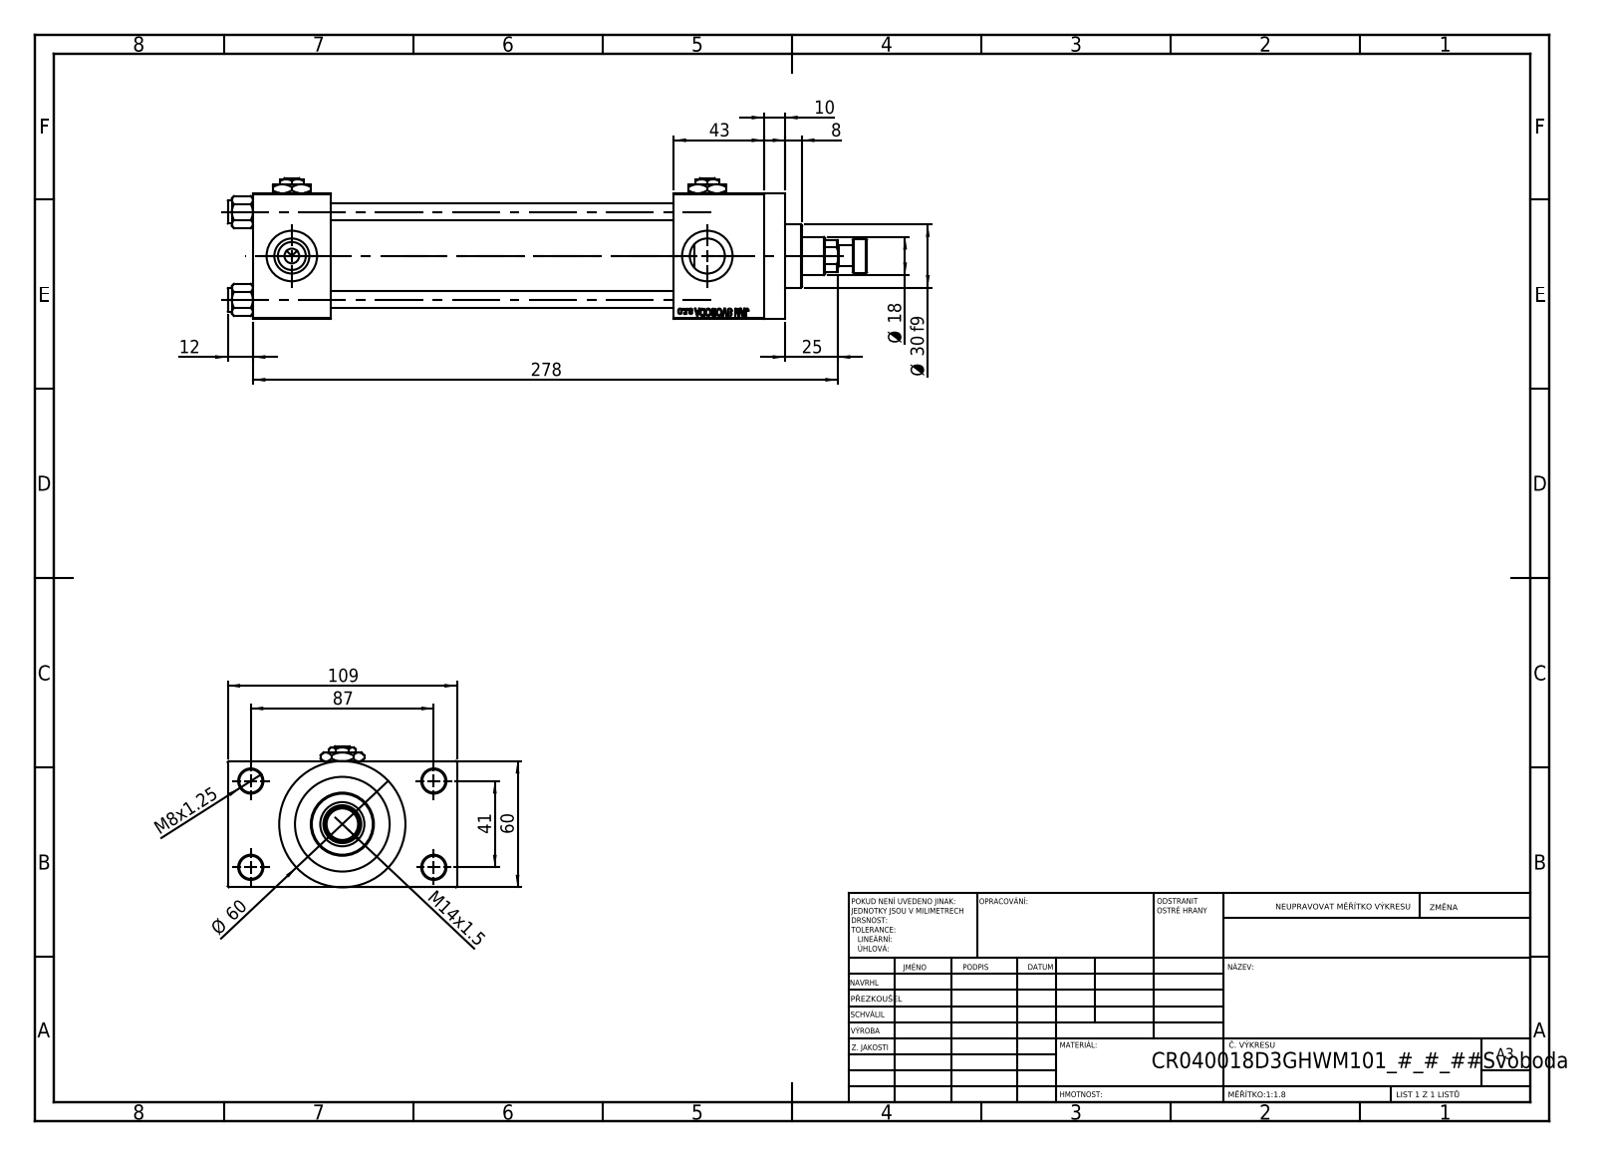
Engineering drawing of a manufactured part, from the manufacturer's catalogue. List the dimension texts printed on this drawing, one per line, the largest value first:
278
109
87
Ø 60
60
43
41
Ø 30 f9
25
Ø 18
M14x1.5
12
10
8
M8x1.25
